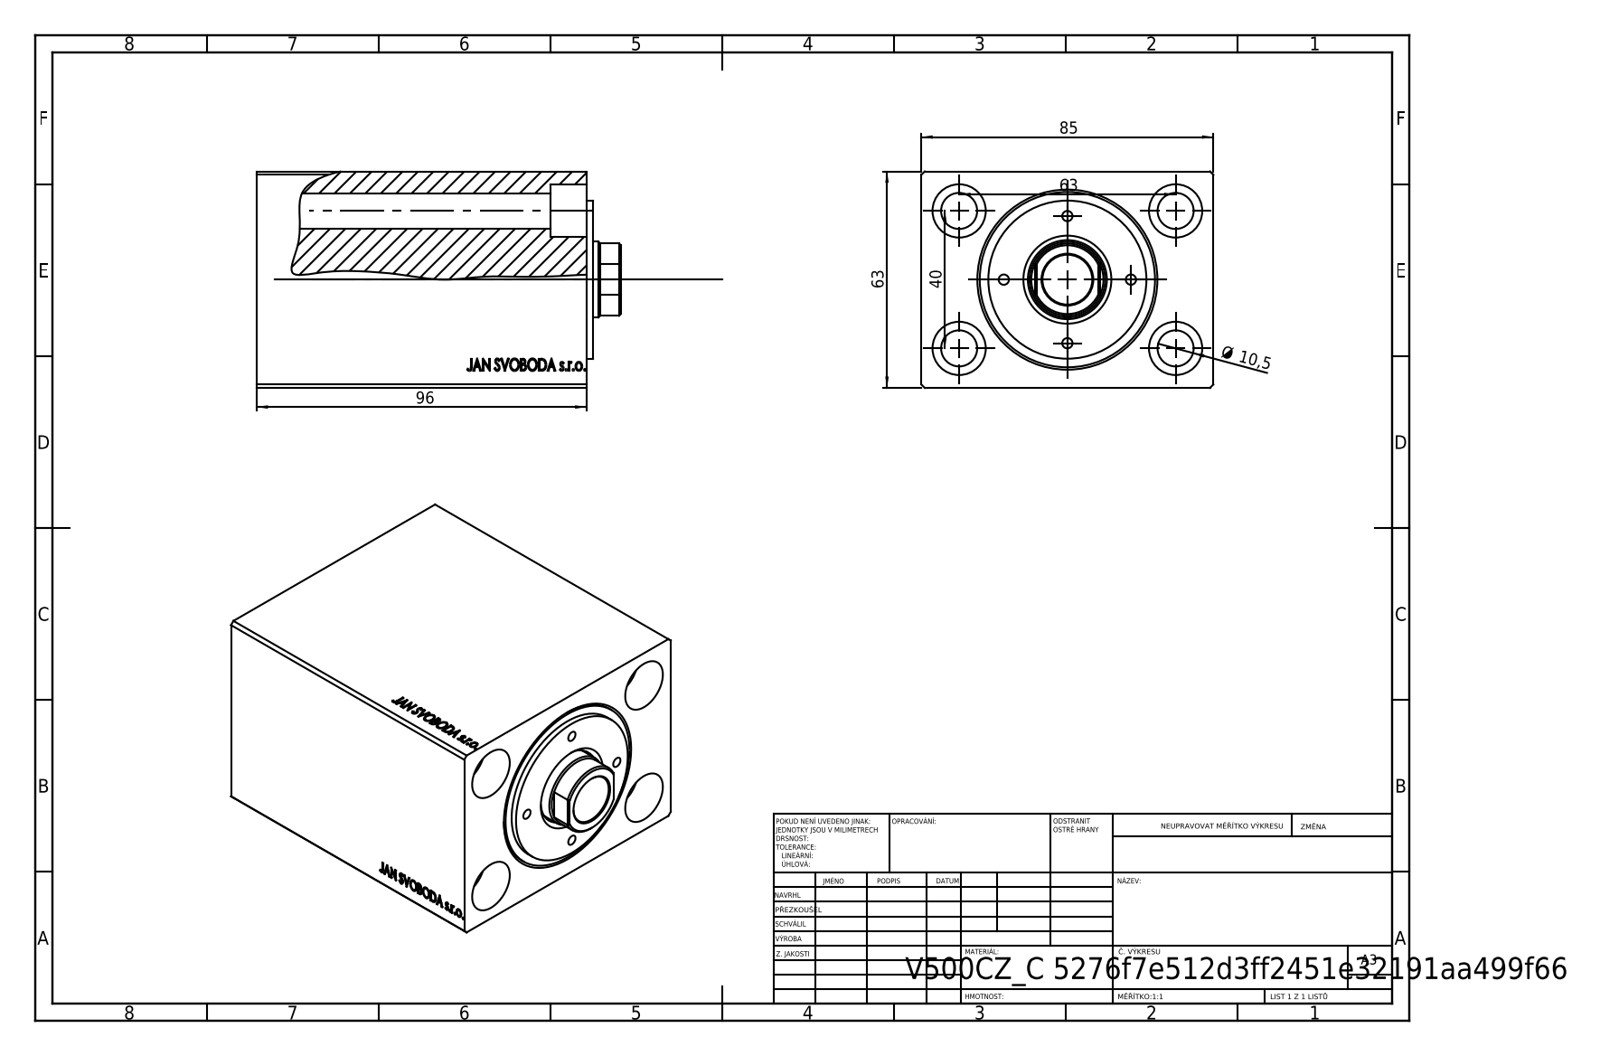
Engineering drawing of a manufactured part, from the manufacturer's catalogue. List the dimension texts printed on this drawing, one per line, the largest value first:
96
85
63
63
40
Ø 10,5
